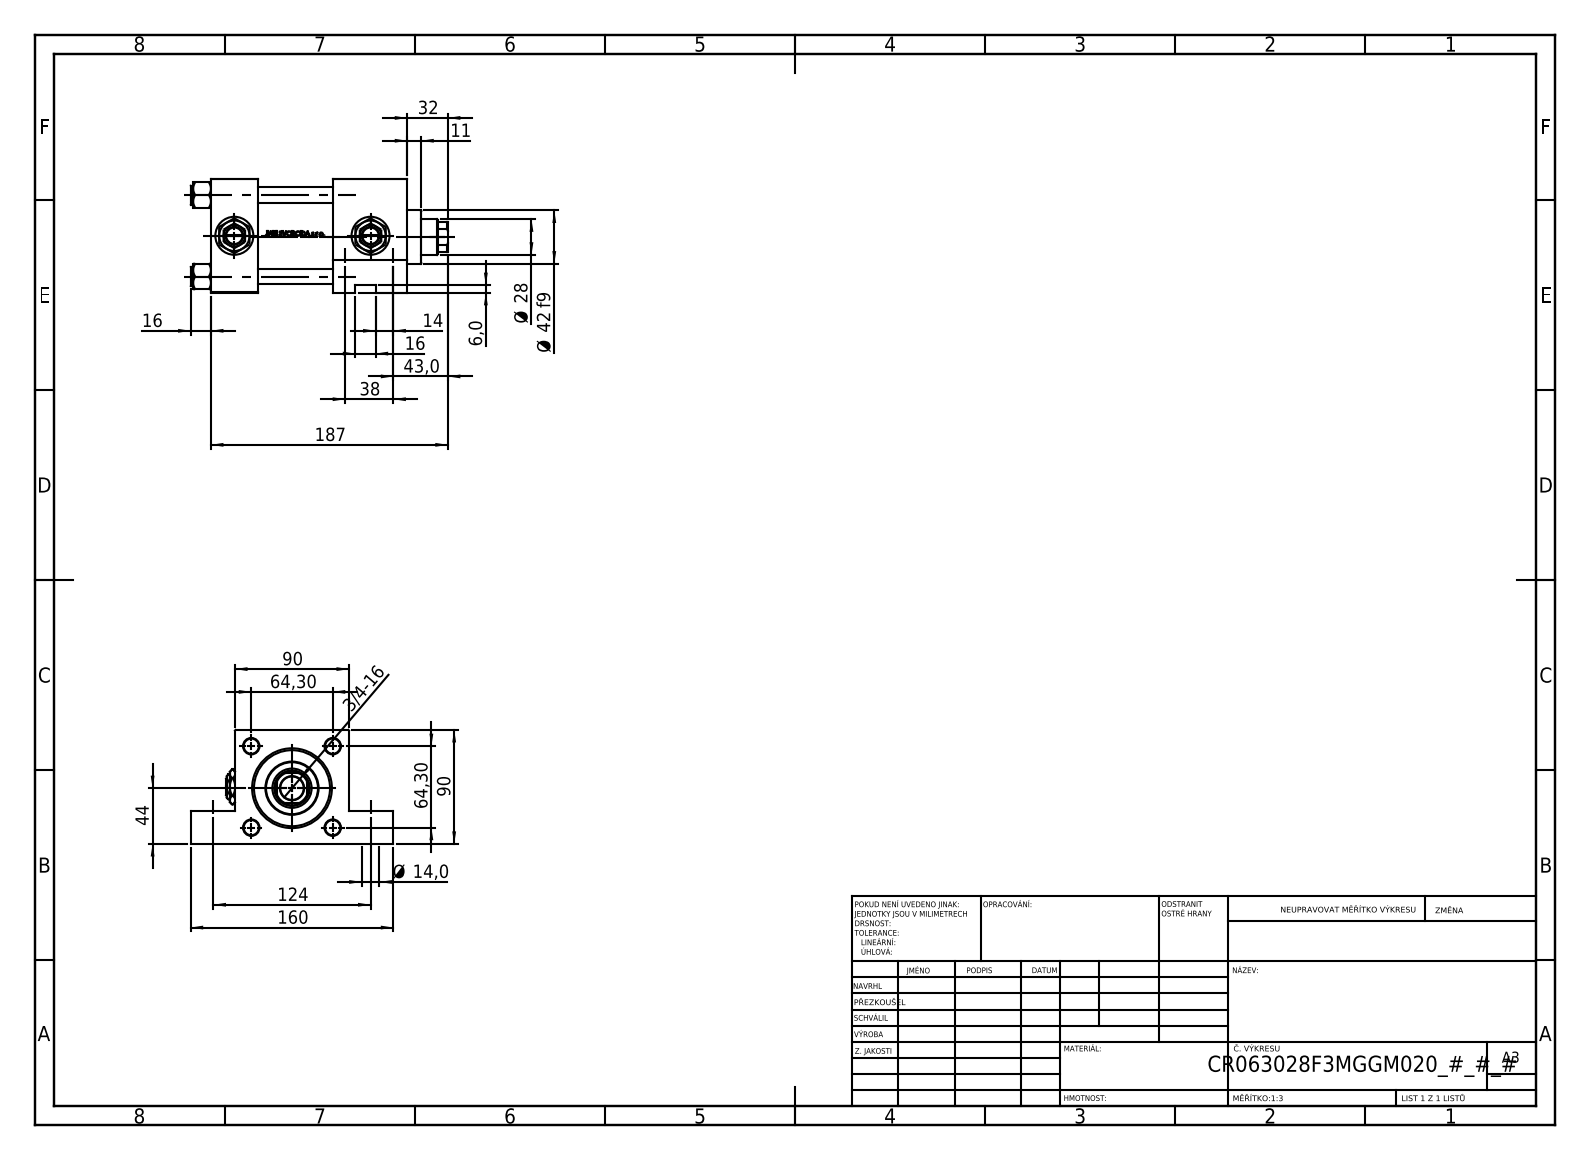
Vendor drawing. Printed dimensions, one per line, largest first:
187
160
124
90
90
64,30
64,30
44
43,0
Ø 42 f9
38
32
Ø 28
16
16
14
Ø 14,0
11
6,0
3/4-16
